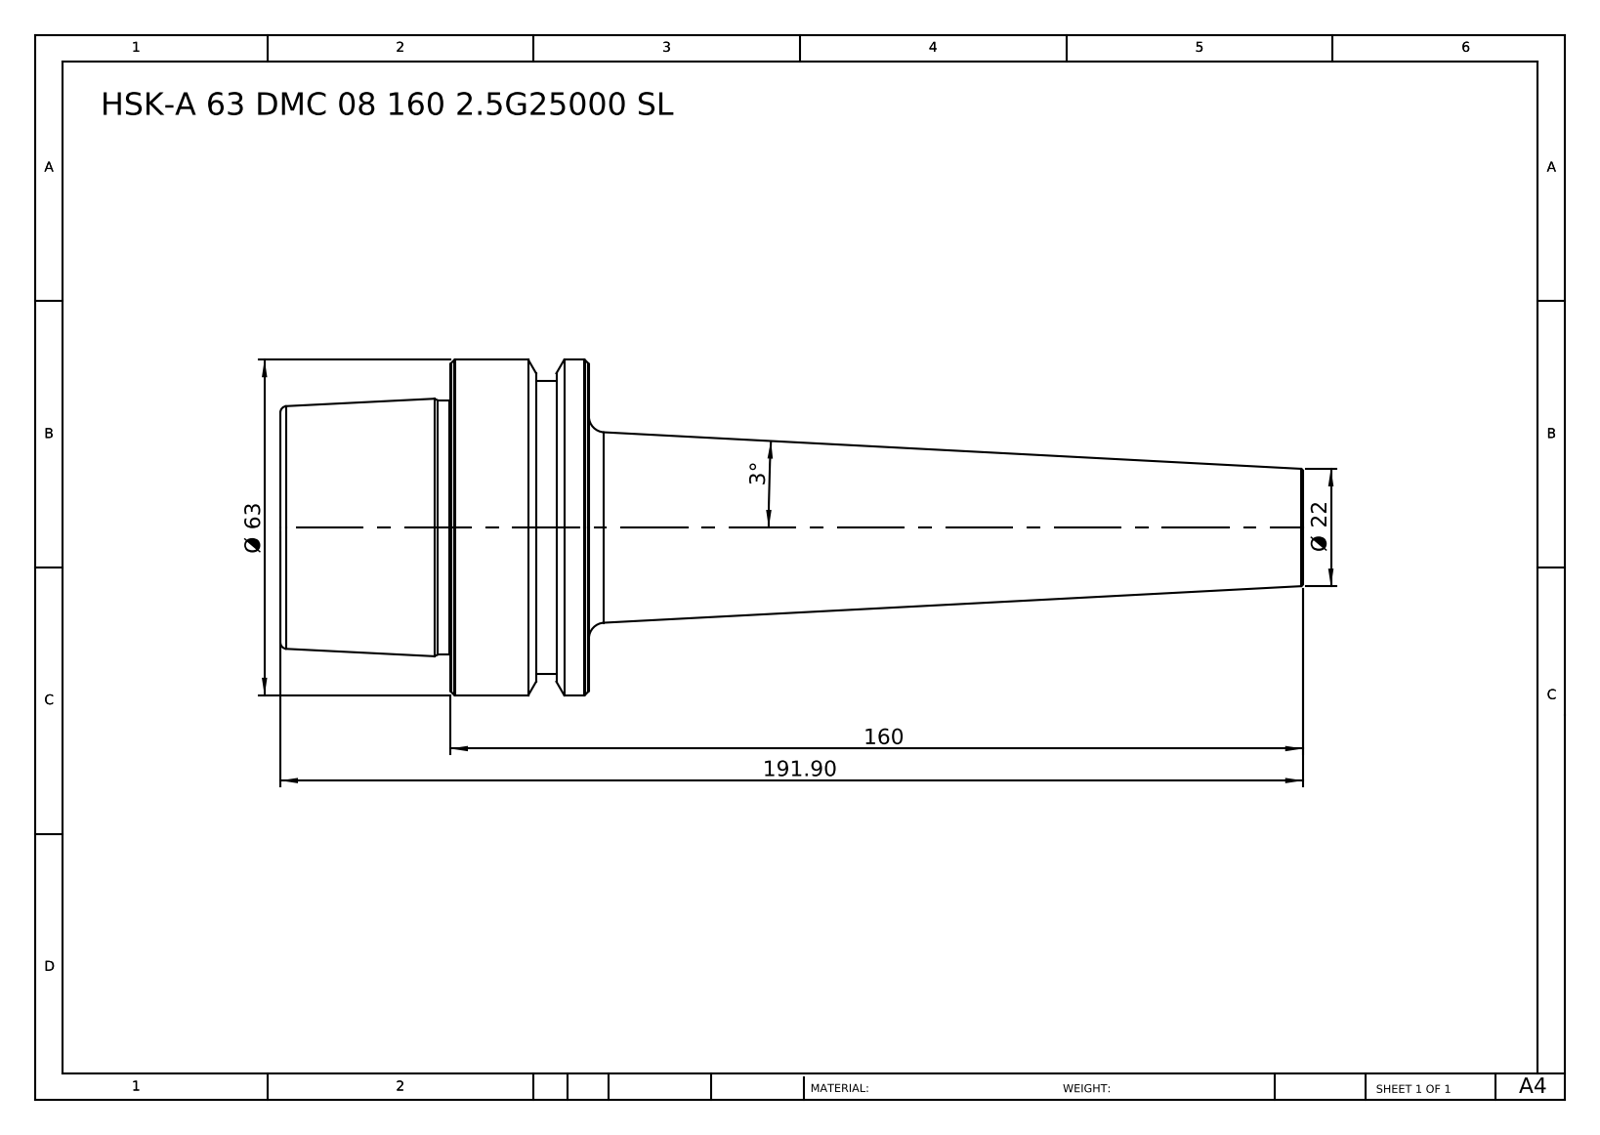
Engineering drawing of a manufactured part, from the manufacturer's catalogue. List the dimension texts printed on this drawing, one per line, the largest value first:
191.90
160
Ø 63
Ø 22
3°
